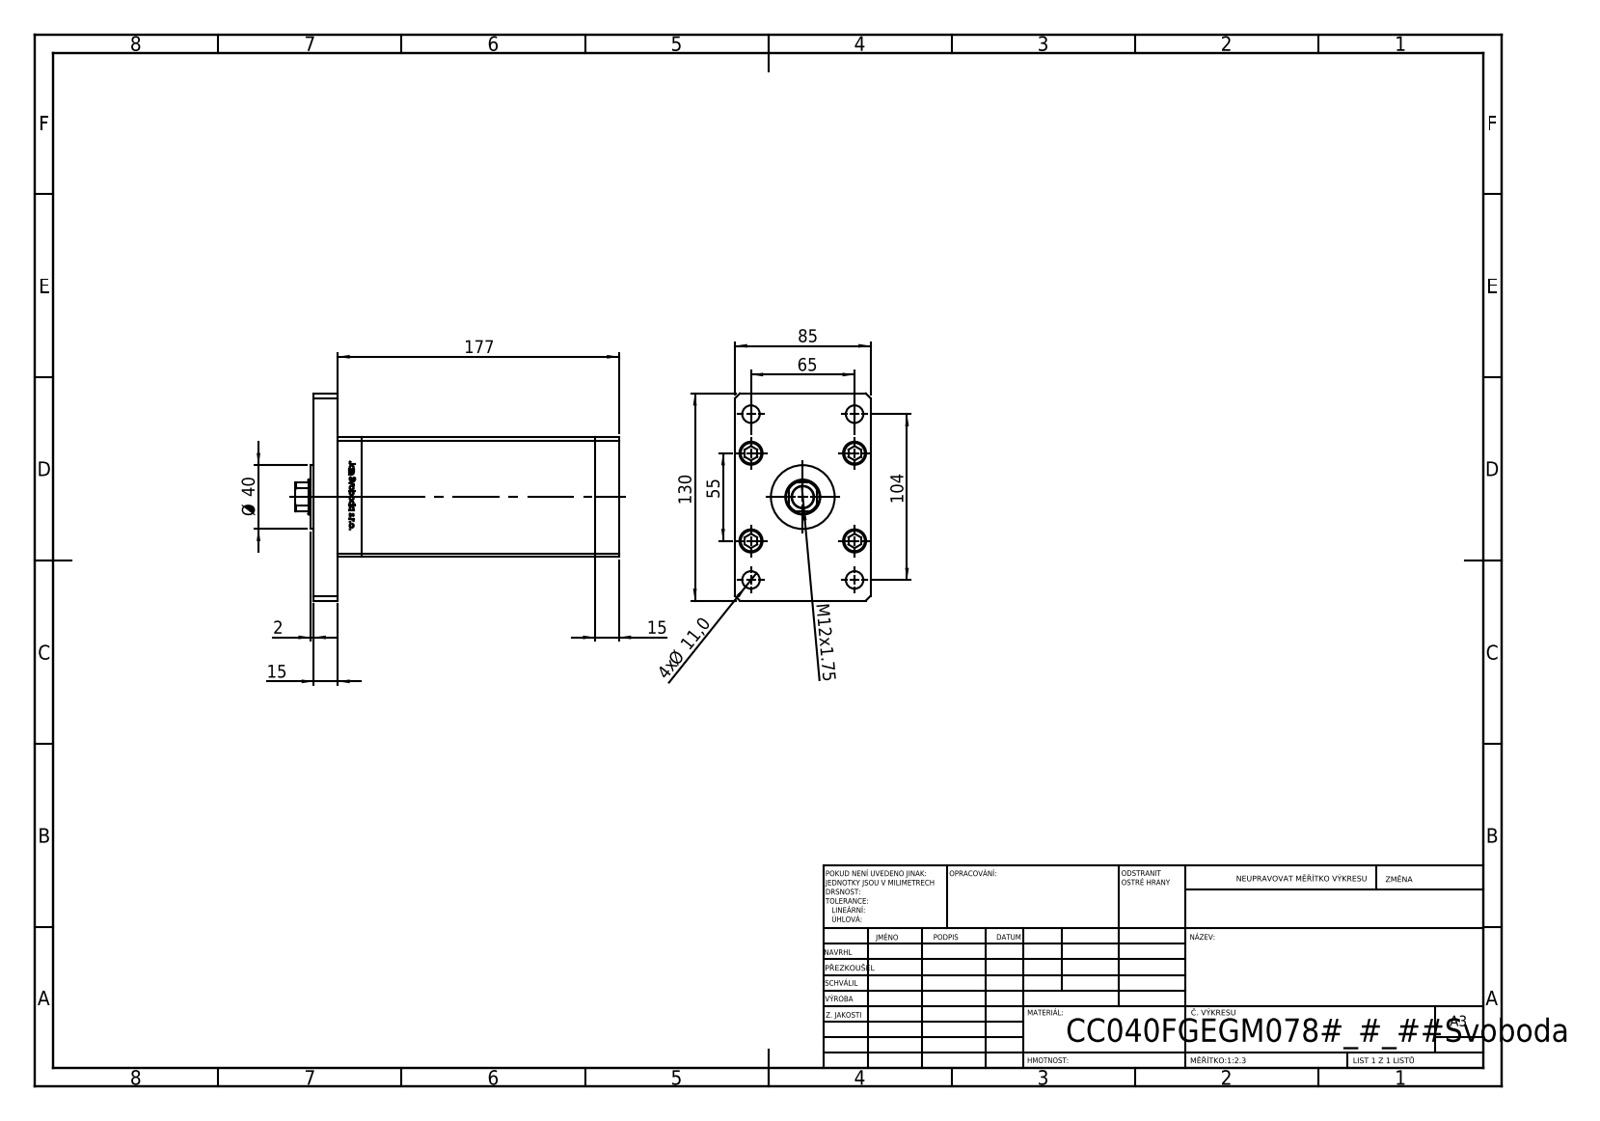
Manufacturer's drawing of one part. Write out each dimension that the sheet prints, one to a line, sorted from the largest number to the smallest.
177
130
104
85
65
55
Ø 40
15
15
M12x1.75
4x Ø 11,0
2
